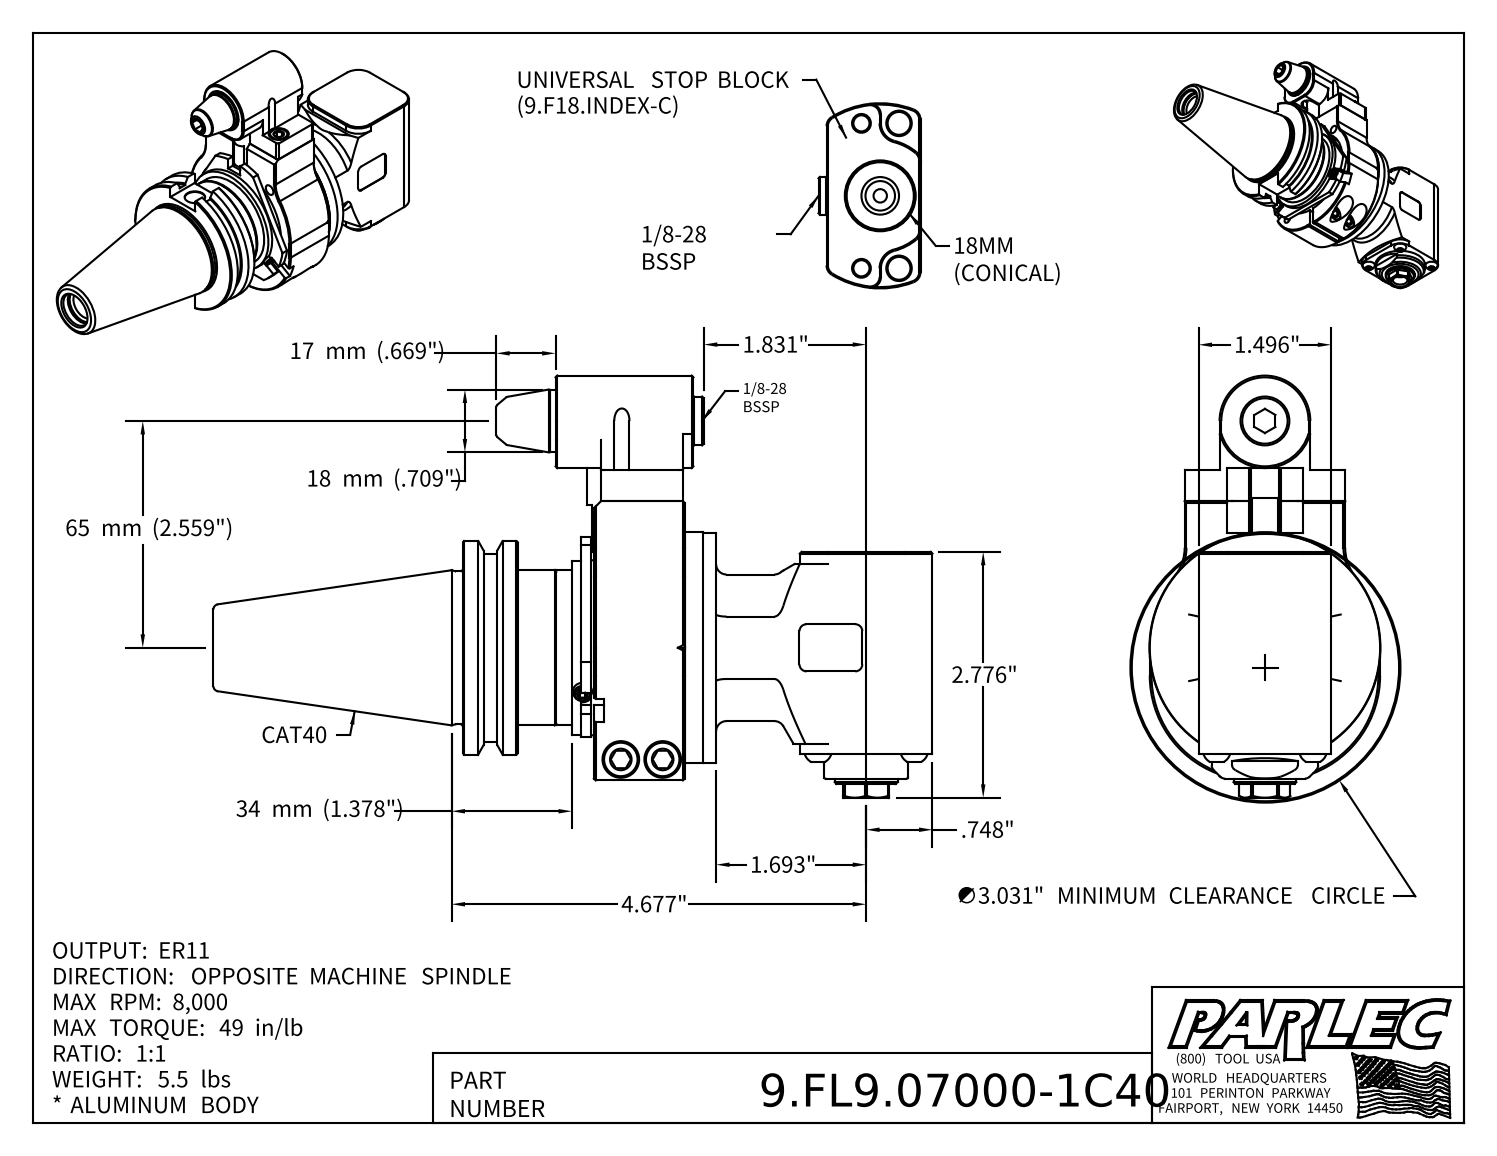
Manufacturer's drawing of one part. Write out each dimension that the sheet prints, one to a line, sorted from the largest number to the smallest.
65 mm (2.559")
34 mm (1.378")
18 mm (.709")
17 mm (.669")
4.677"
∅3.031" MINIMUM CLEARANCE CIRCLE
2.776"
1.831"
1.693"
1.496"
.748"
